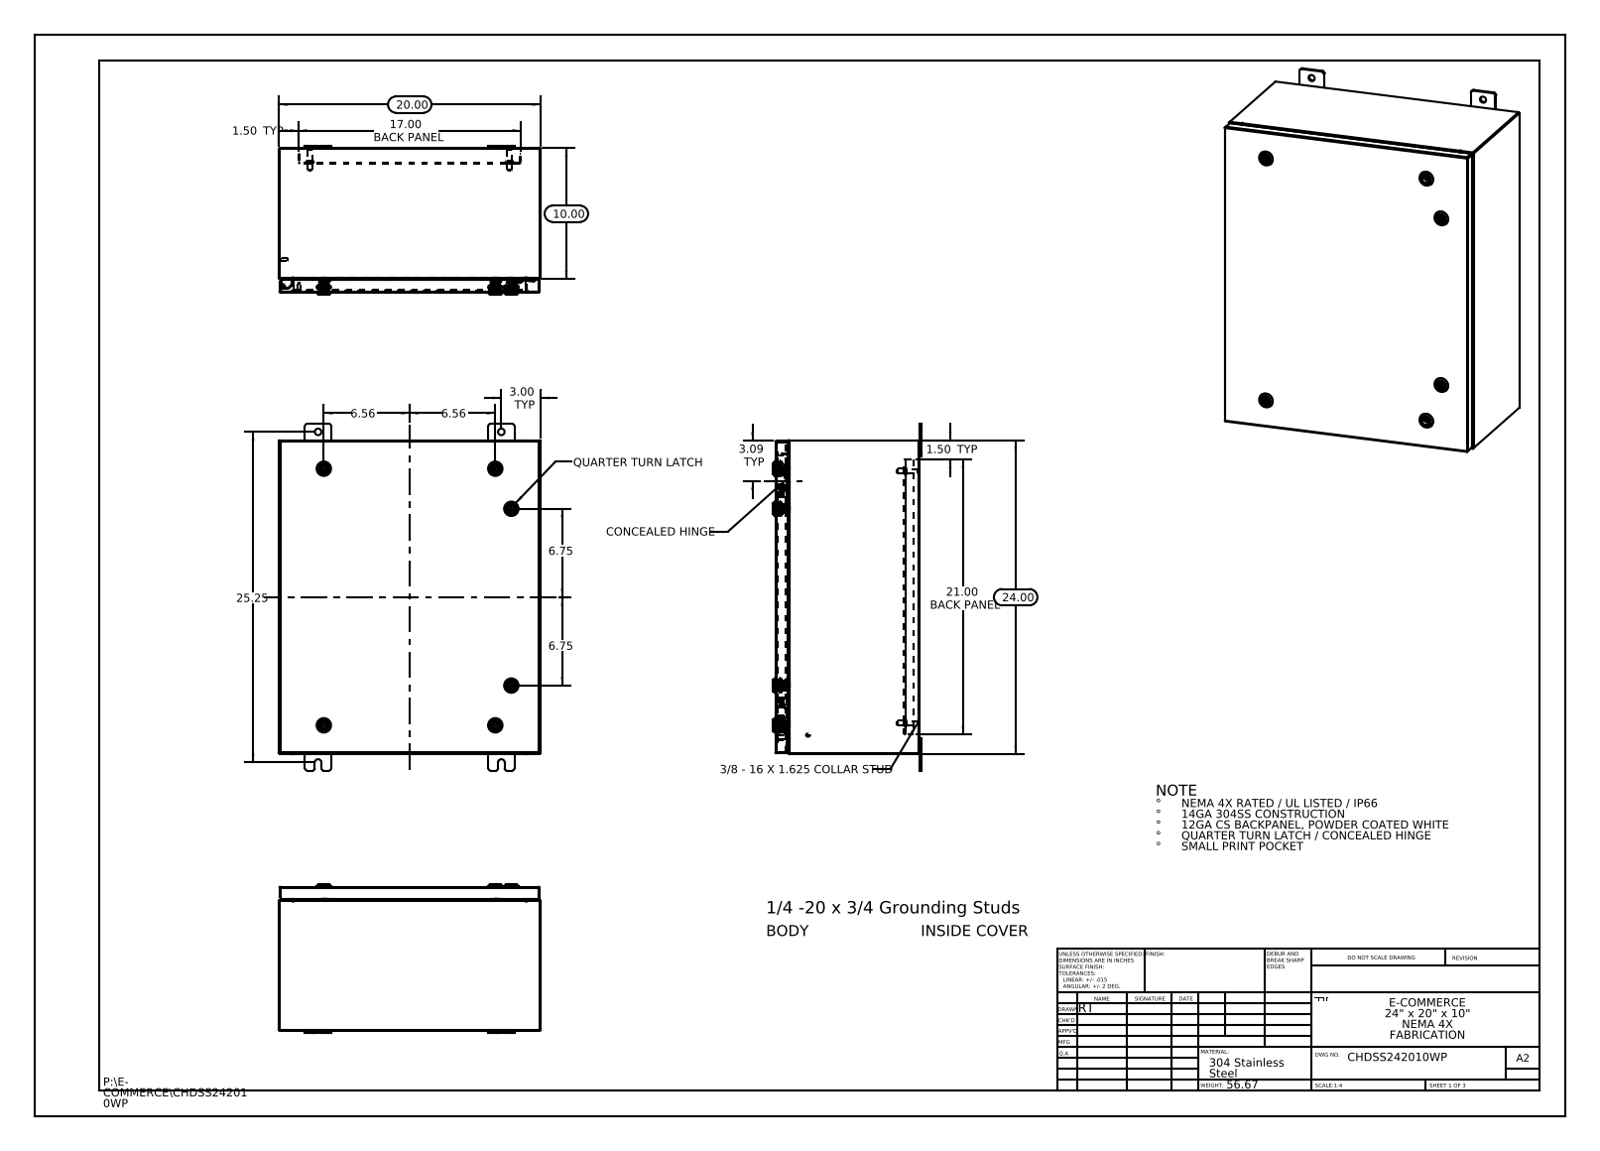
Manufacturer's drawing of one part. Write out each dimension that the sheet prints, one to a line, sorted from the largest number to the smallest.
25.25
24.00
21.00 BACK PANEL
20.00
17.00 BACK PANEL
10.00
6.75
6.75
6.56
6.56
3.09 TYP
3.00 TYP
1.50 TYP
1.50 TYP
